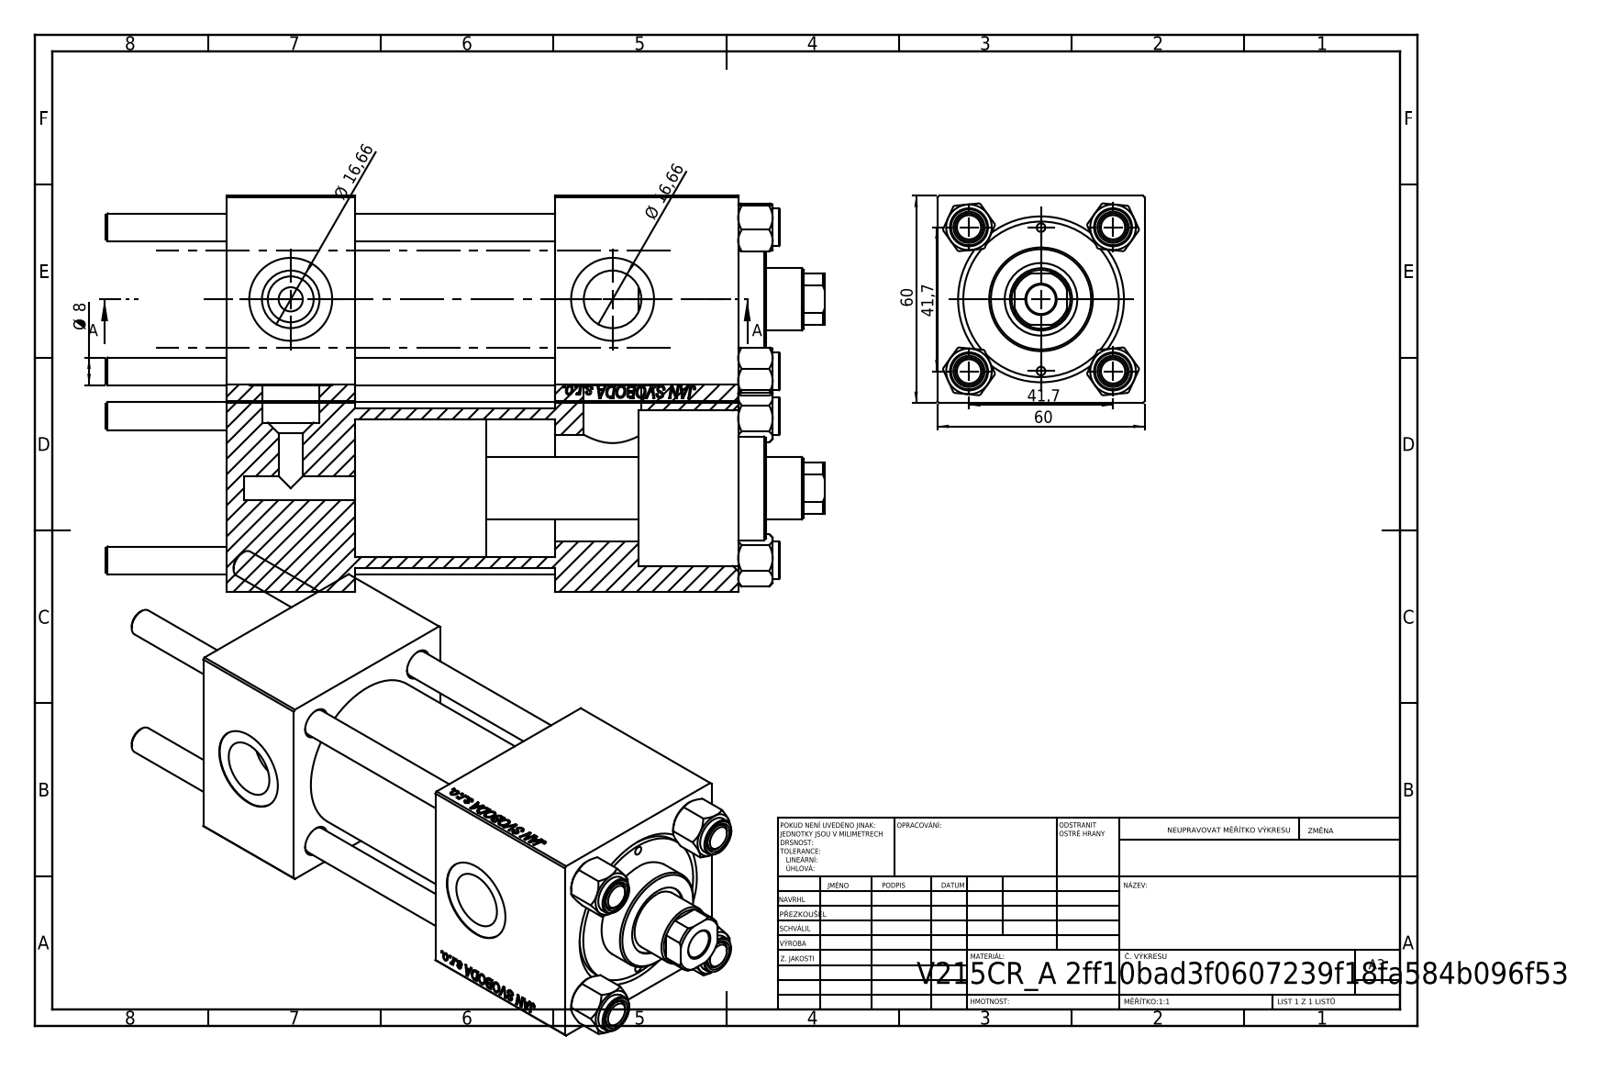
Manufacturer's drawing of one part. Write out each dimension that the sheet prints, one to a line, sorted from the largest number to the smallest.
60
60
41,7
41,7
Ø 16,66
Ø 16,66
Ø 8
